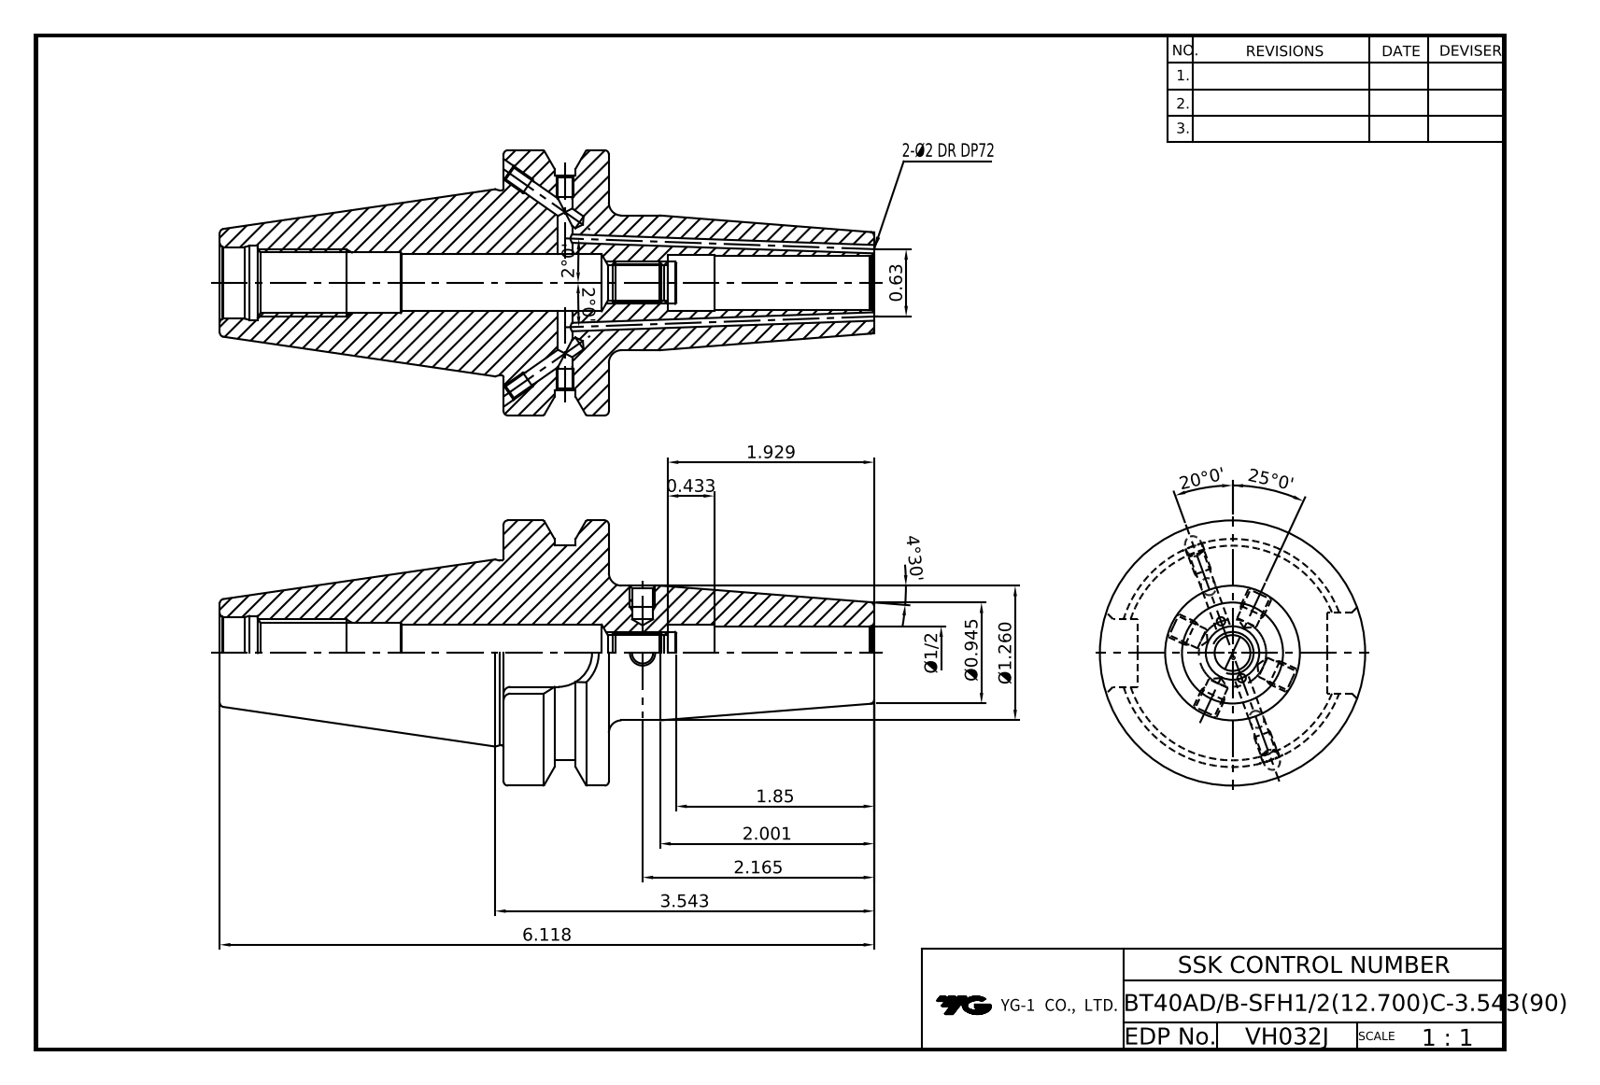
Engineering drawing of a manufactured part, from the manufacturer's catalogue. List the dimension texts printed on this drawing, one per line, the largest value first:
25°0'
6.118
4°30'
3.543
2.165
2.001
2°0'
2°0'
1.929
1.85
Ø1.260
Ø0.945
0.63
0.433
